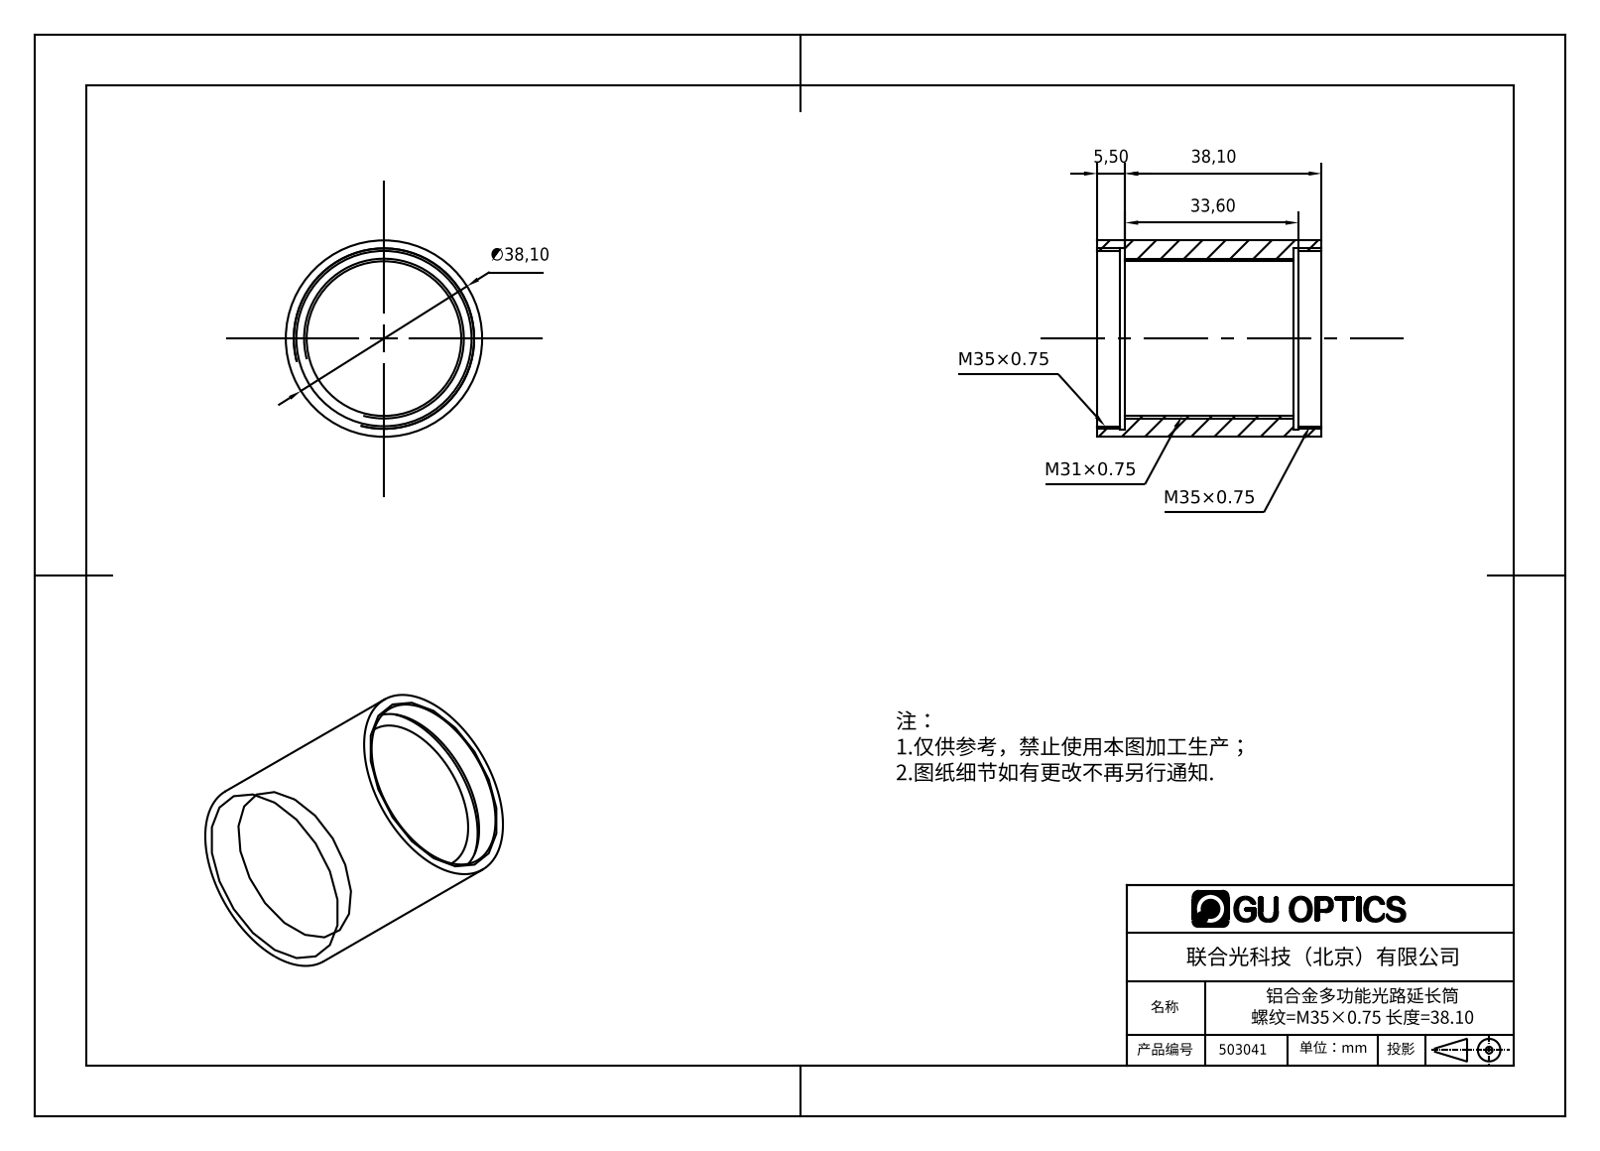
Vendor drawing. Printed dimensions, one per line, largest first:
∅38,10
38,10
33,60
5,50
